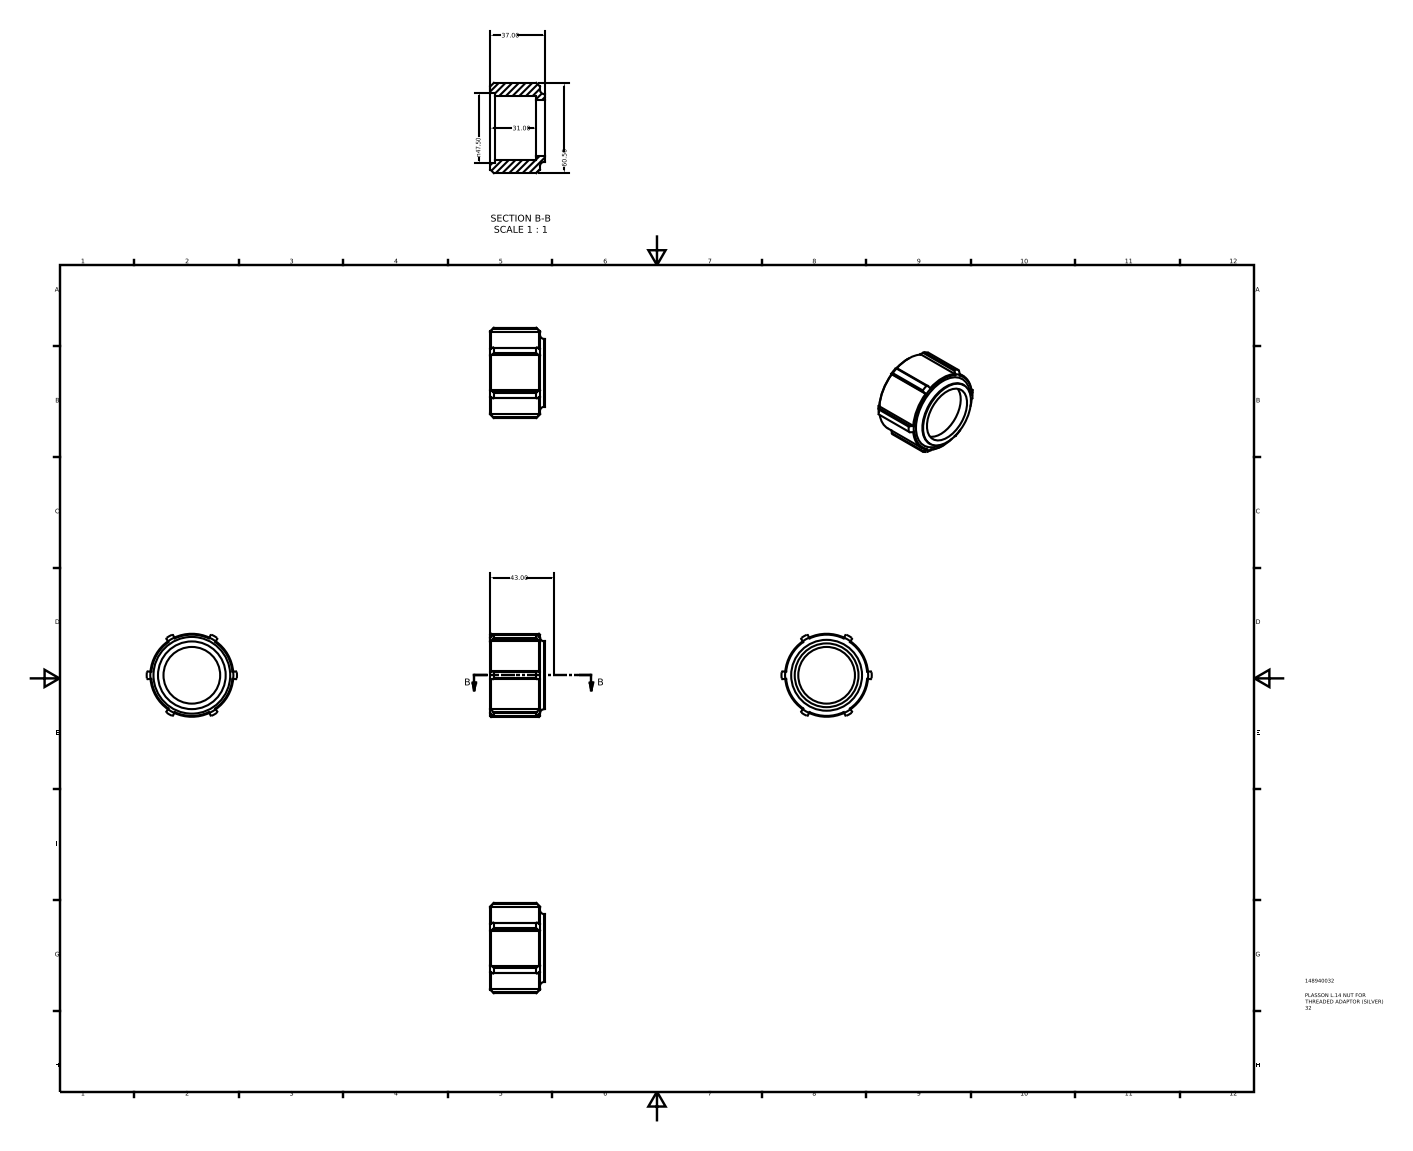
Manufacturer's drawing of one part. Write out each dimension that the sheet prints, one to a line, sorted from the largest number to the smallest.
60.50
n47.50
43.00
37.00
31.00
